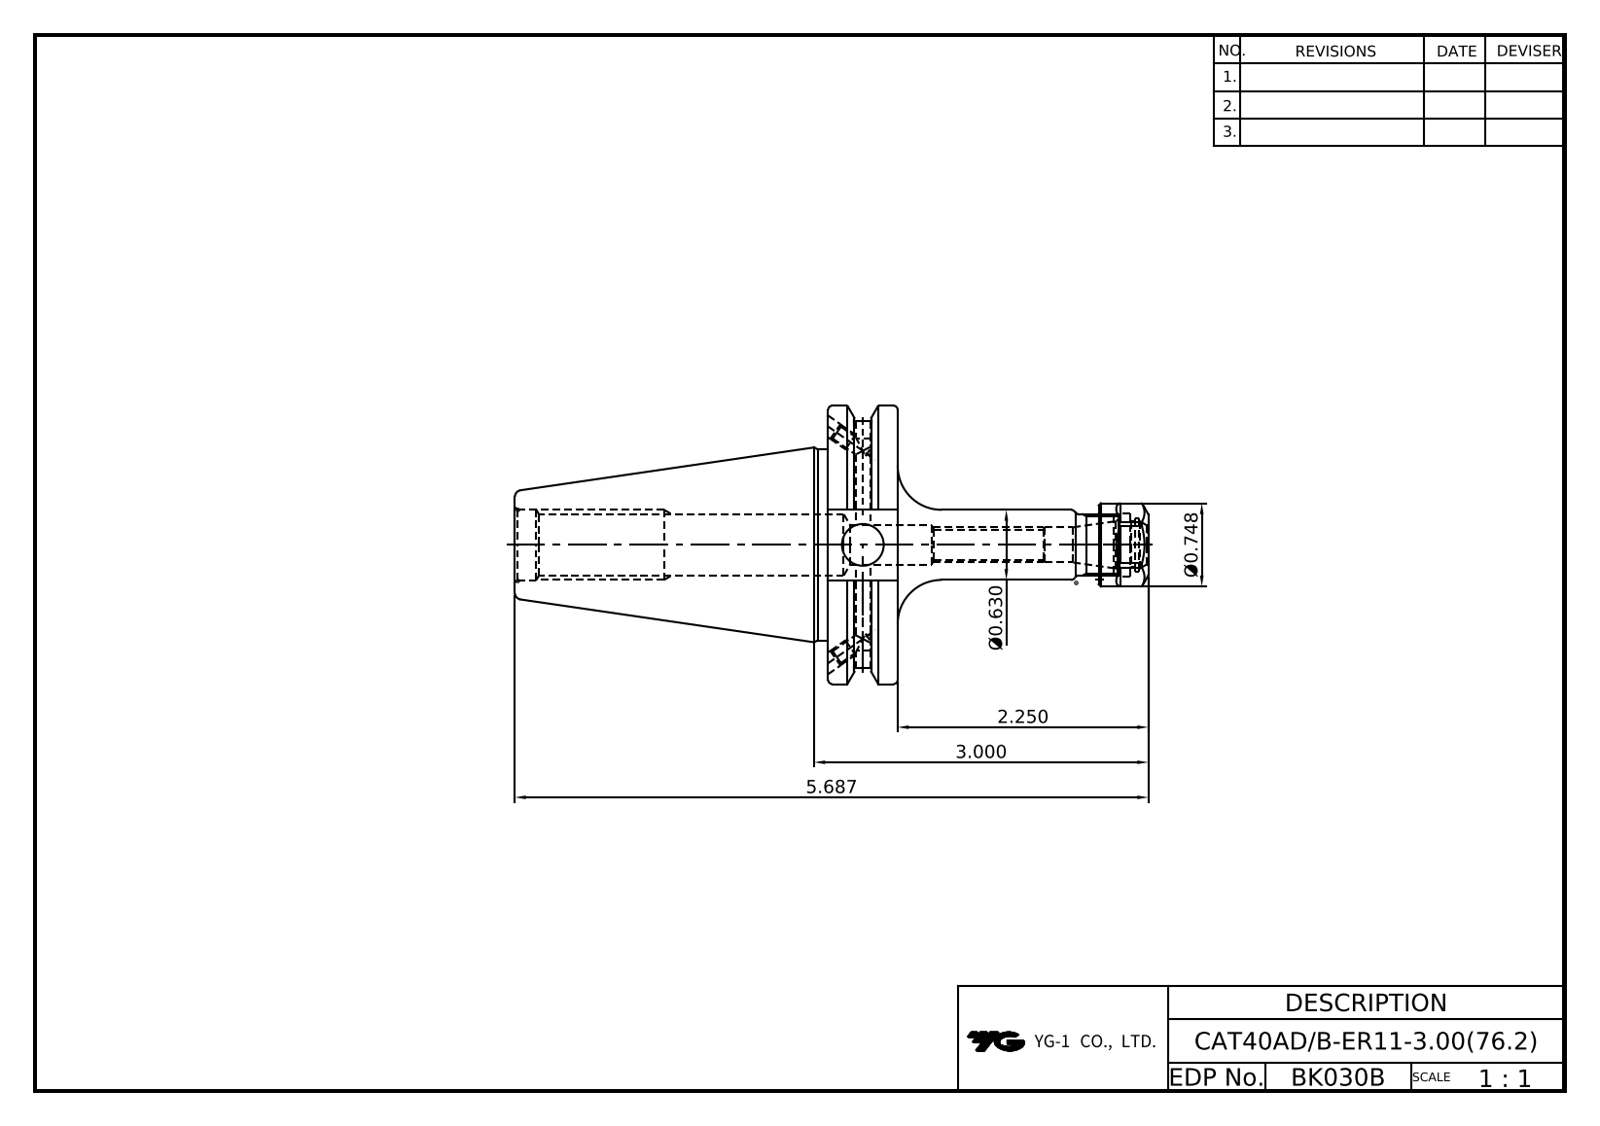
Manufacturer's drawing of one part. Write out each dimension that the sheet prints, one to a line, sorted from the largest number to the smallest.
5.687
3.000
2.250
Ø0.748
Ø0.630
